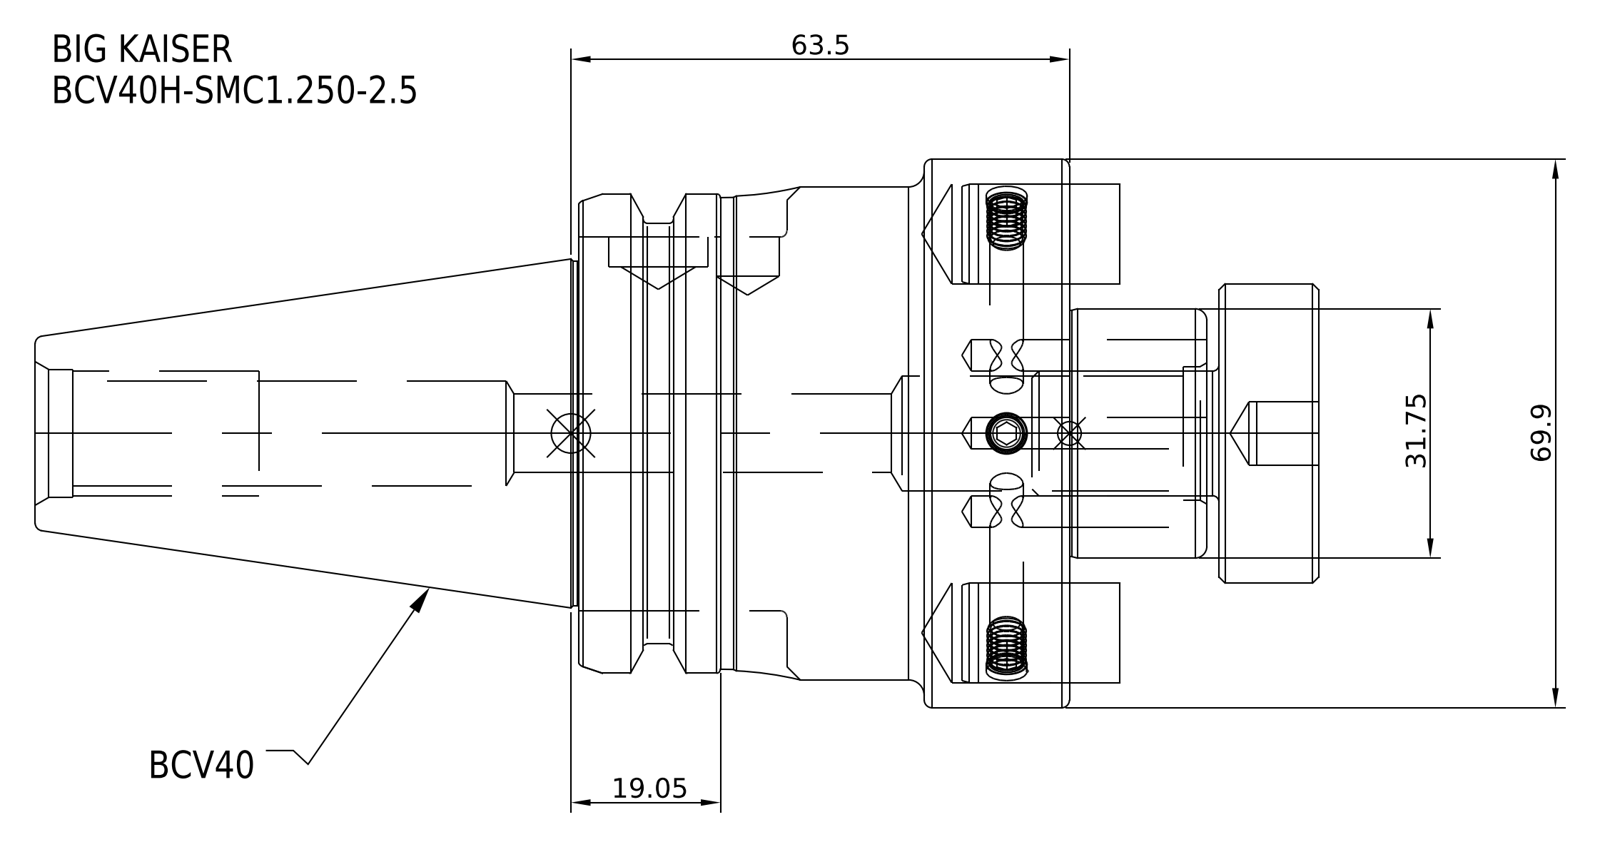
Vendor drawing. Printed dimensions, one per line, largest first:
69.9
63.5
31.75
19.05
